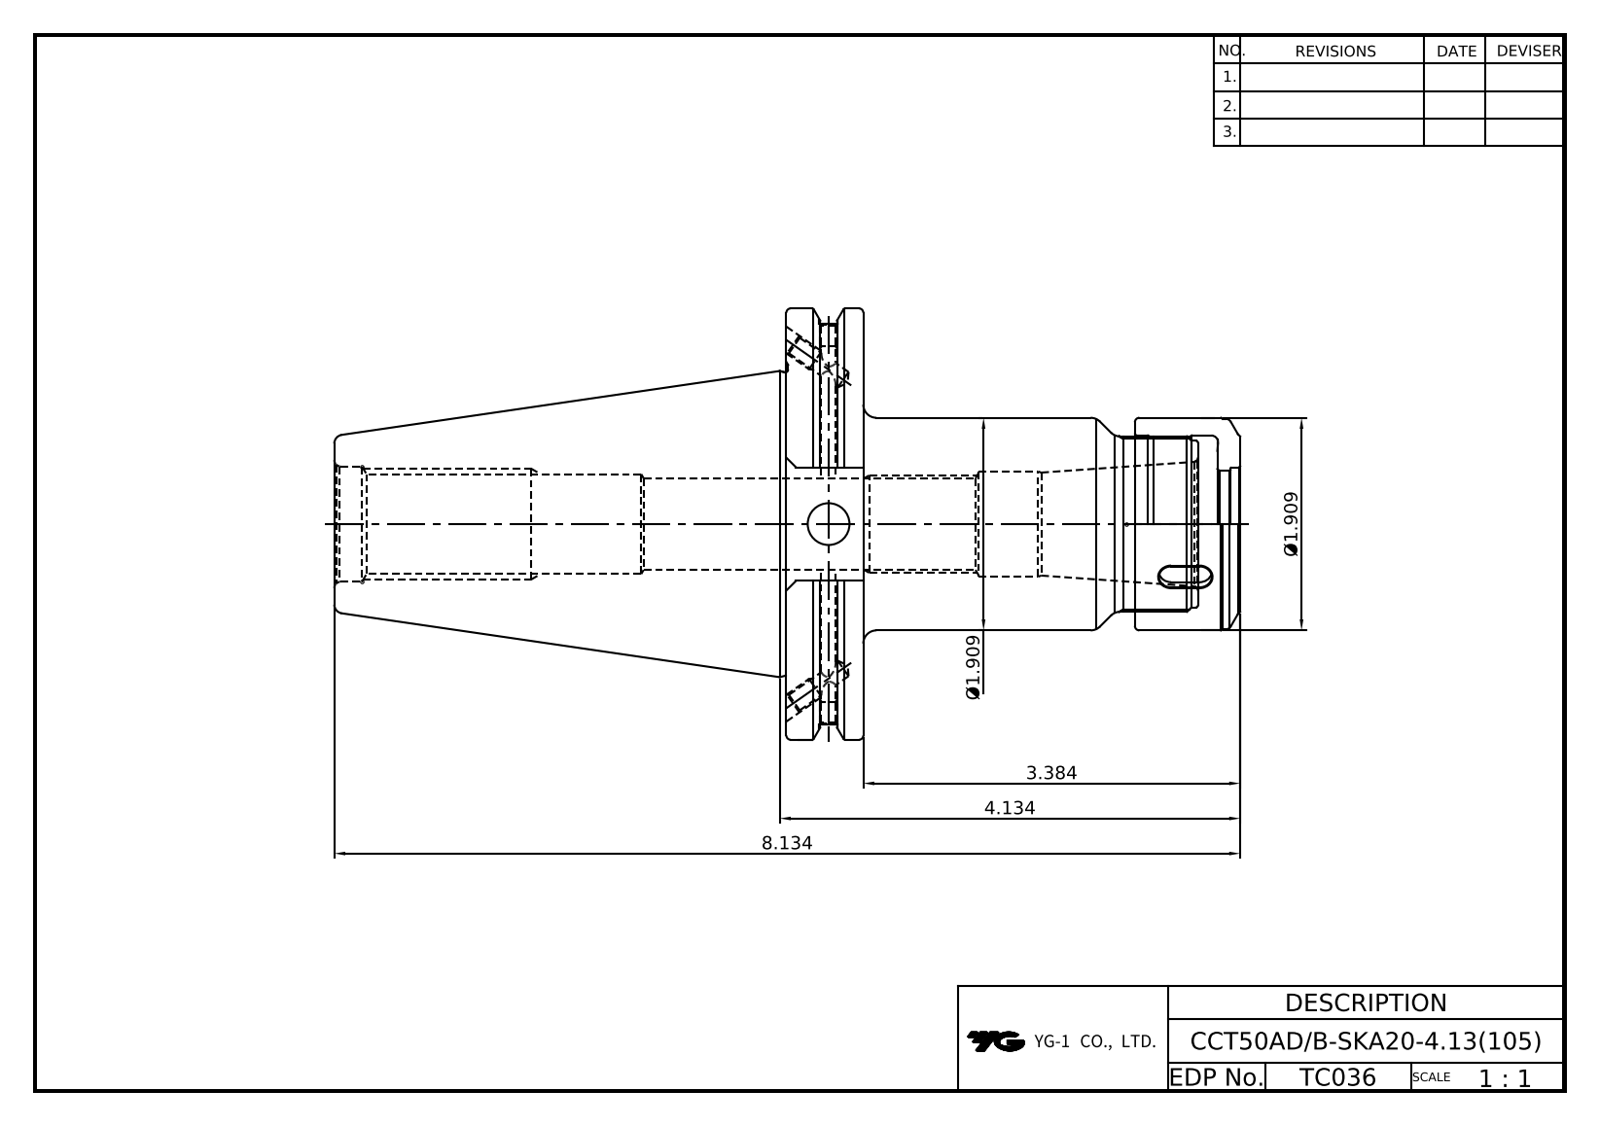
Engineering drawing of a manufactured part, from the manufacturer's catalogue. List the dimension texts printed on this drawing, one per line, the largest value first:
8.134
4.134
3.384
Ø1.909
Ø1.909
